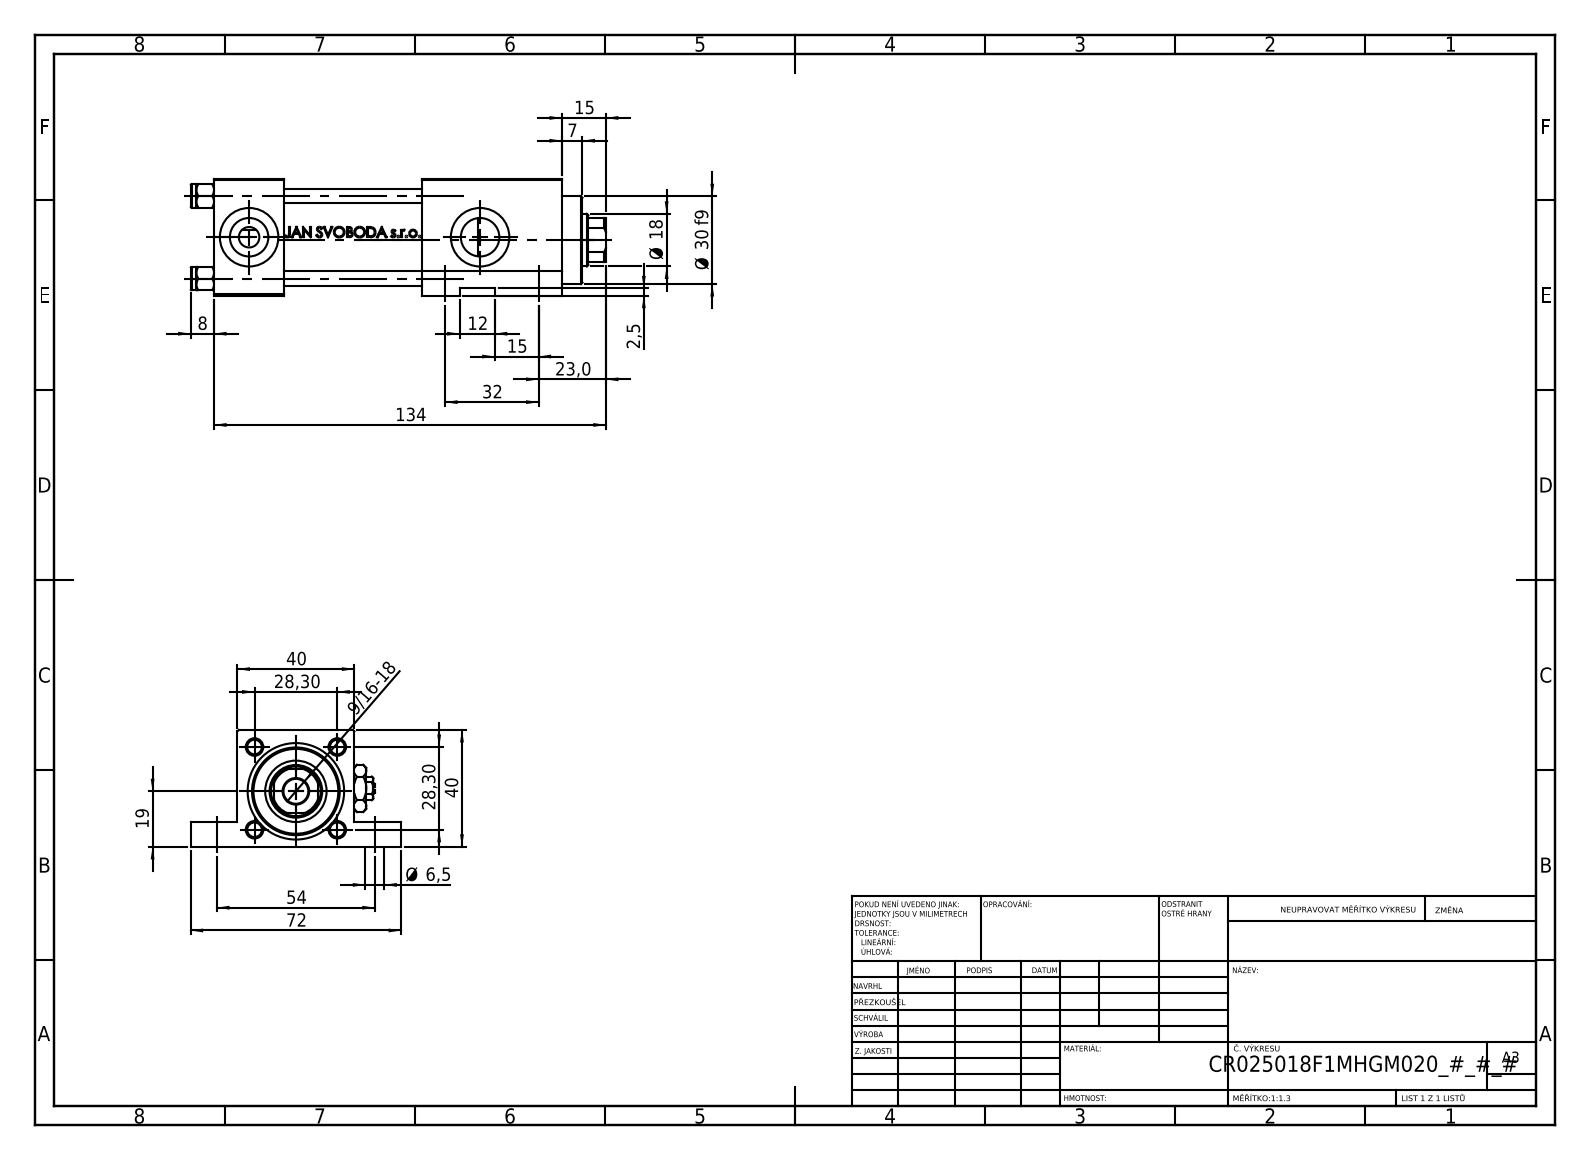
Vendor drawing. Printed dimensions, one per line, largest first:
134
72
54
40
40
32
Ø 30 f9
28,30
28,30
23,0
19
Ø 18
15
15
12
8
7
Ø 6,5
2,5
9/16-18
